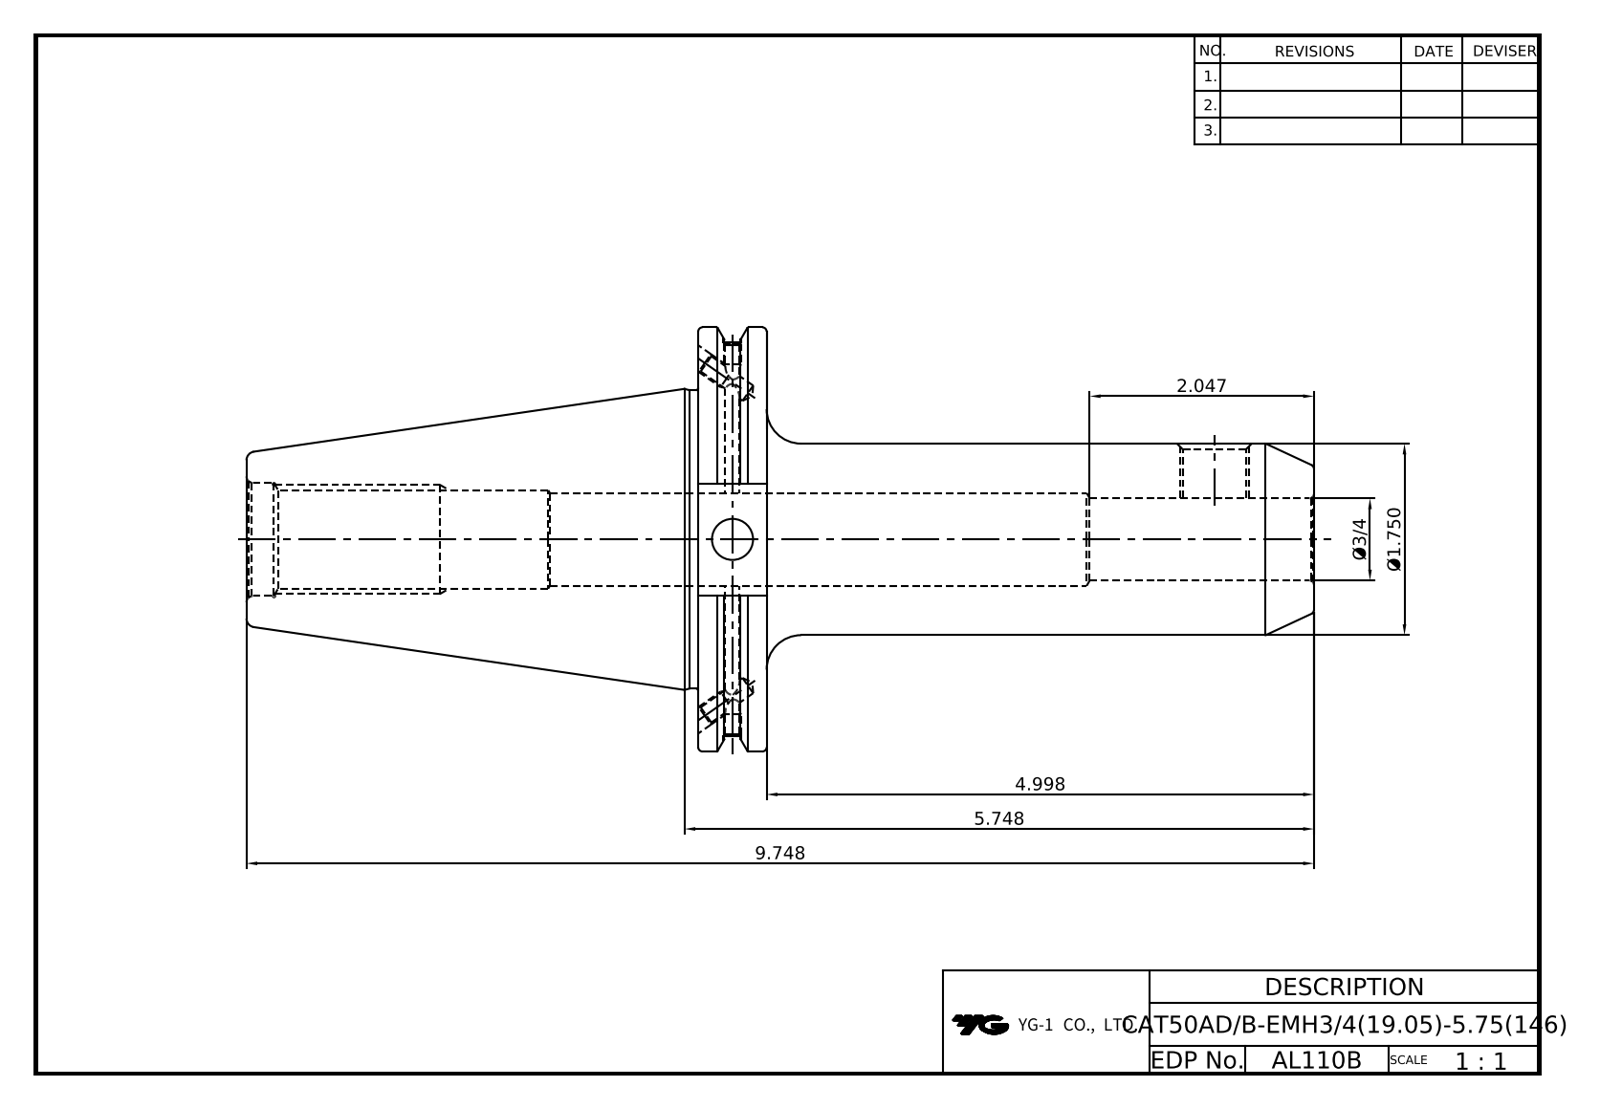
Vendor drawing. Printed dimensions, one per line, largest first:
9.748
5.748
4.998
2.047
Ø1.750
Ø3/4
